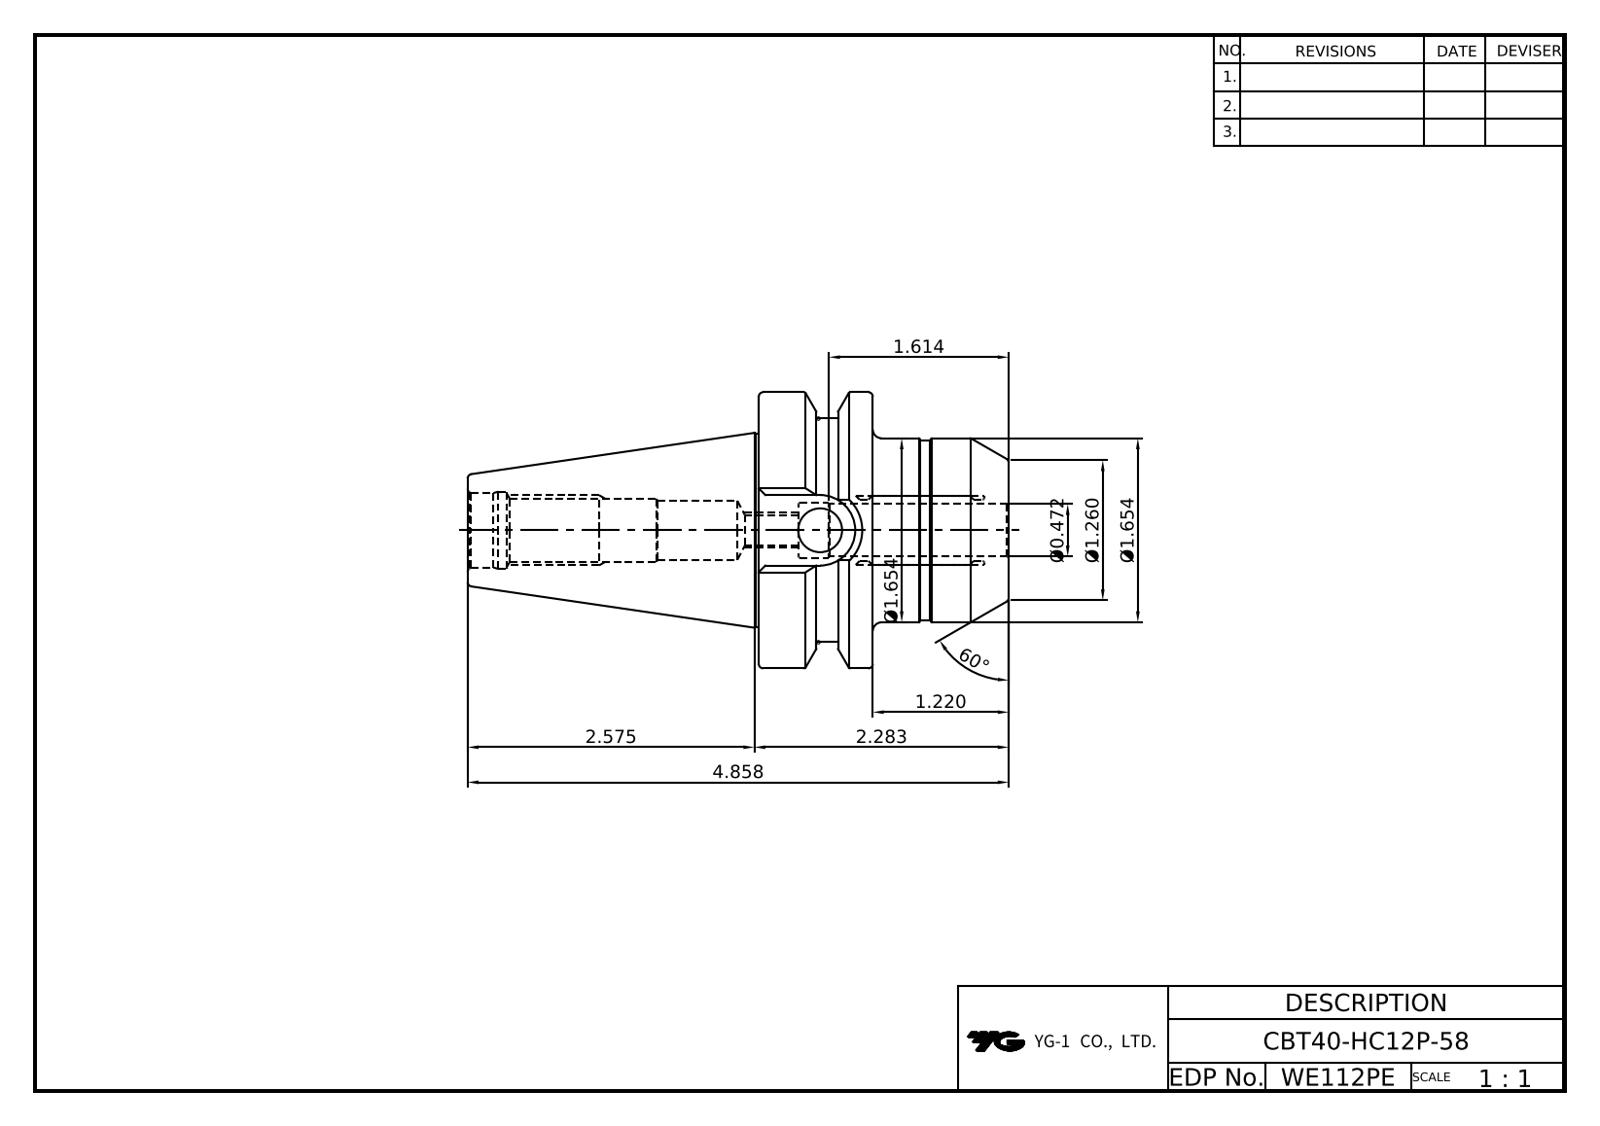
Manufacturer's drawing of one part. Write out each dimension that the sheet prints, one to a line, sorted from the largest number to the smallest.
60°
4.858
2.575
2.283
Ø1.654
Ø1.654
1.614
Ø1.260
1.220
Ø0.472
